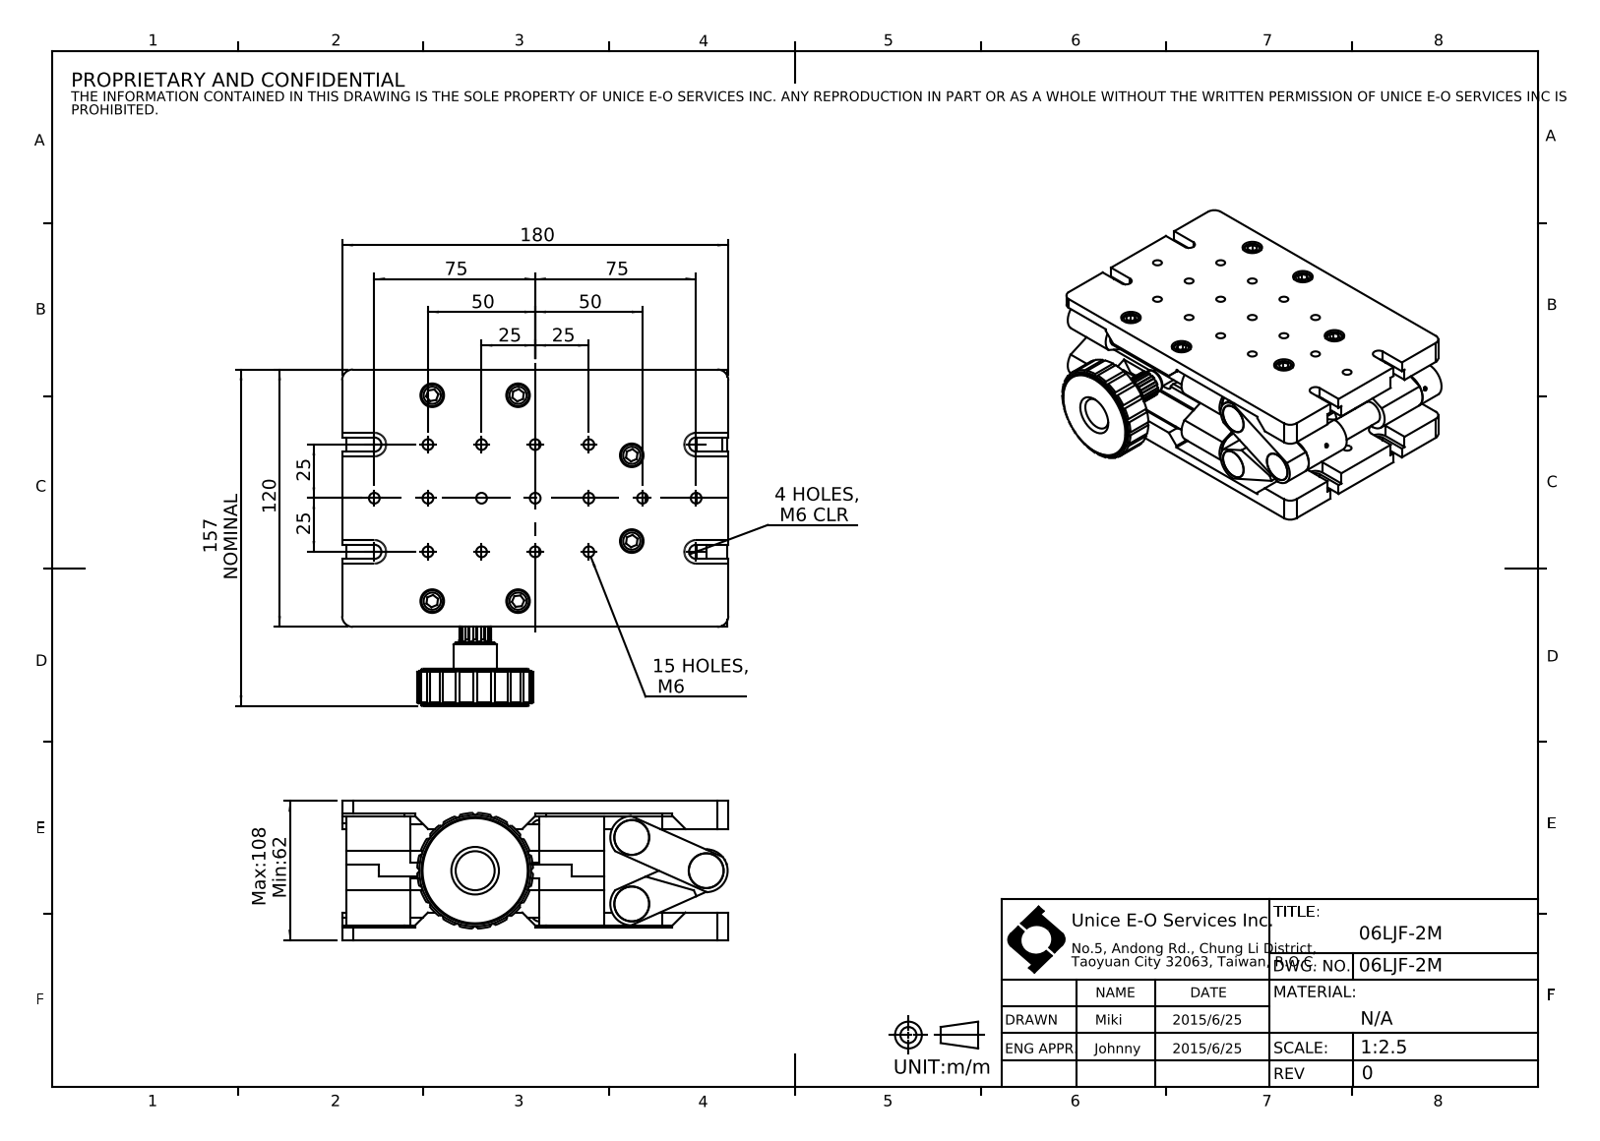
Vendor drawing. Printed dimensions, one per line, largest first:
180
157 NOMINAL
120
Max:108 Min:62
75
75
50
50
25
25
25
25
15 HOLES, M6
4 HOLES, M6 CLR
